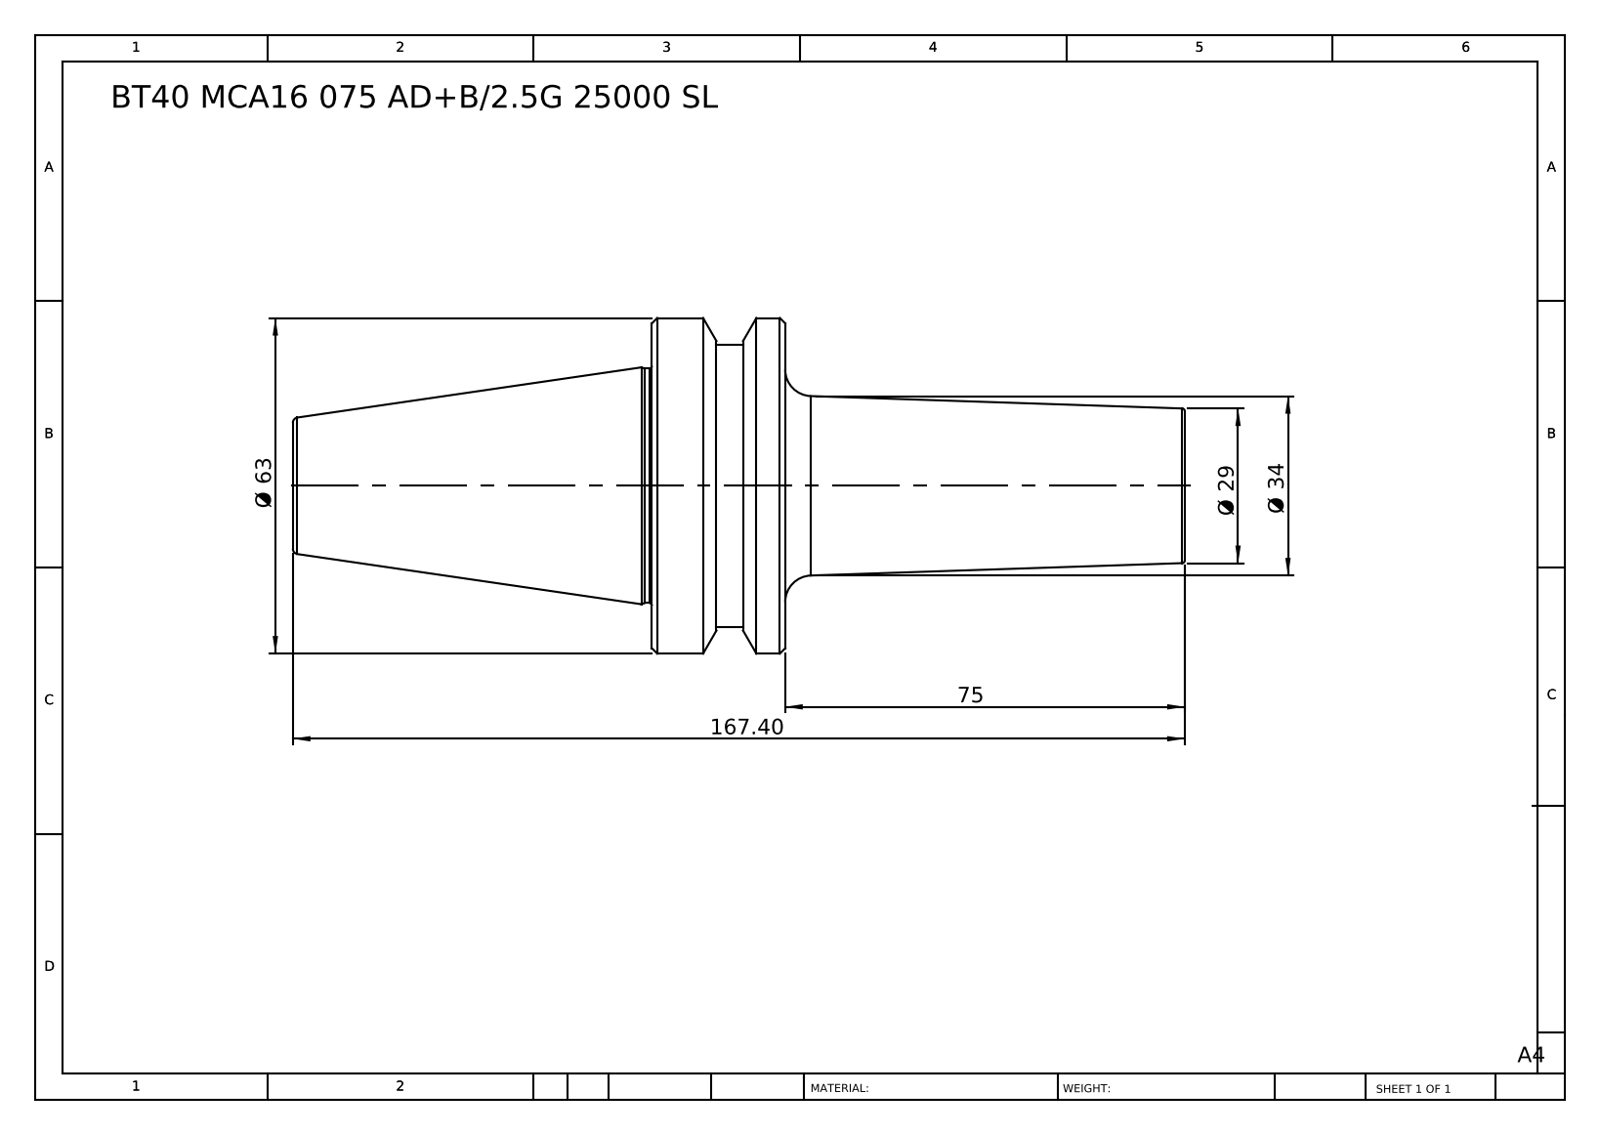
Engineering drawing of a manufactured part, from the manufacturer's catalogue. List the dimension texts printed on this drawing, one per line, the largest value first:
167.40
75
Ø 63
Ø 34
Ø 29
